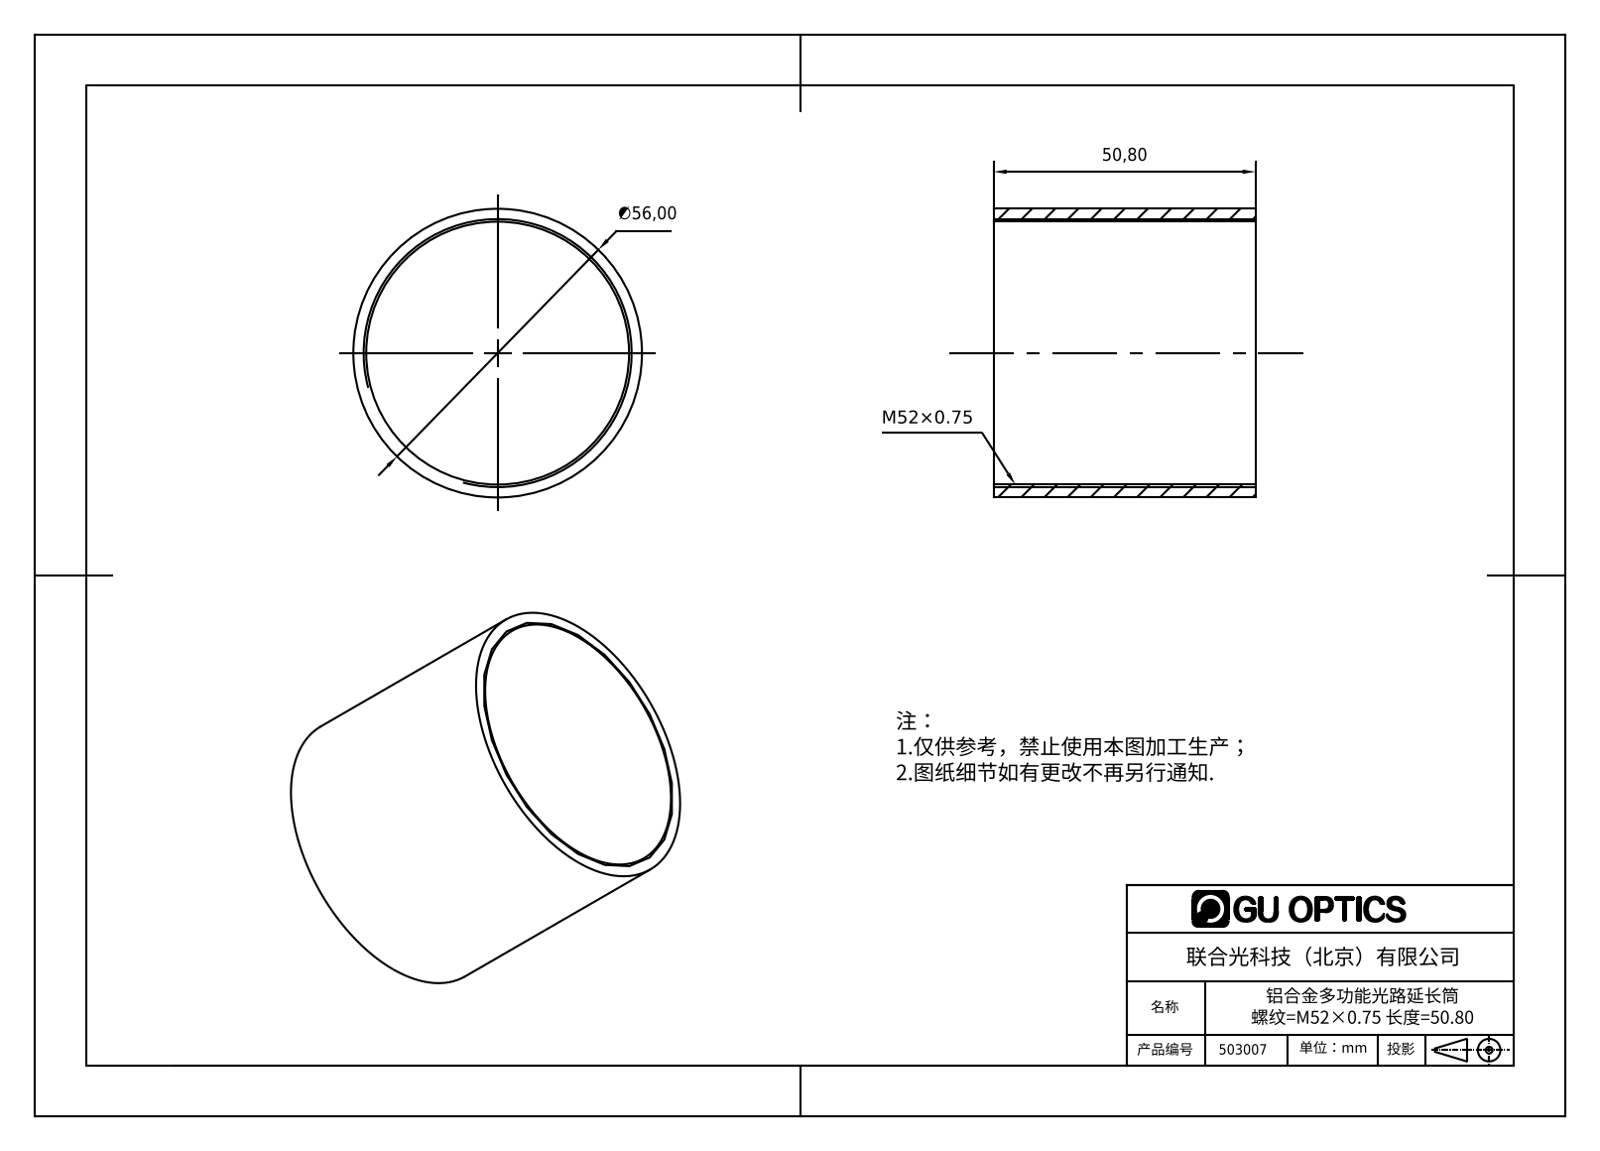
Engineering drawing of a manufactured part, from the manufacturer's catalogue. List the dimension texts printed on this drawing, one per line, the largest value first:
∅56,00
50,80
